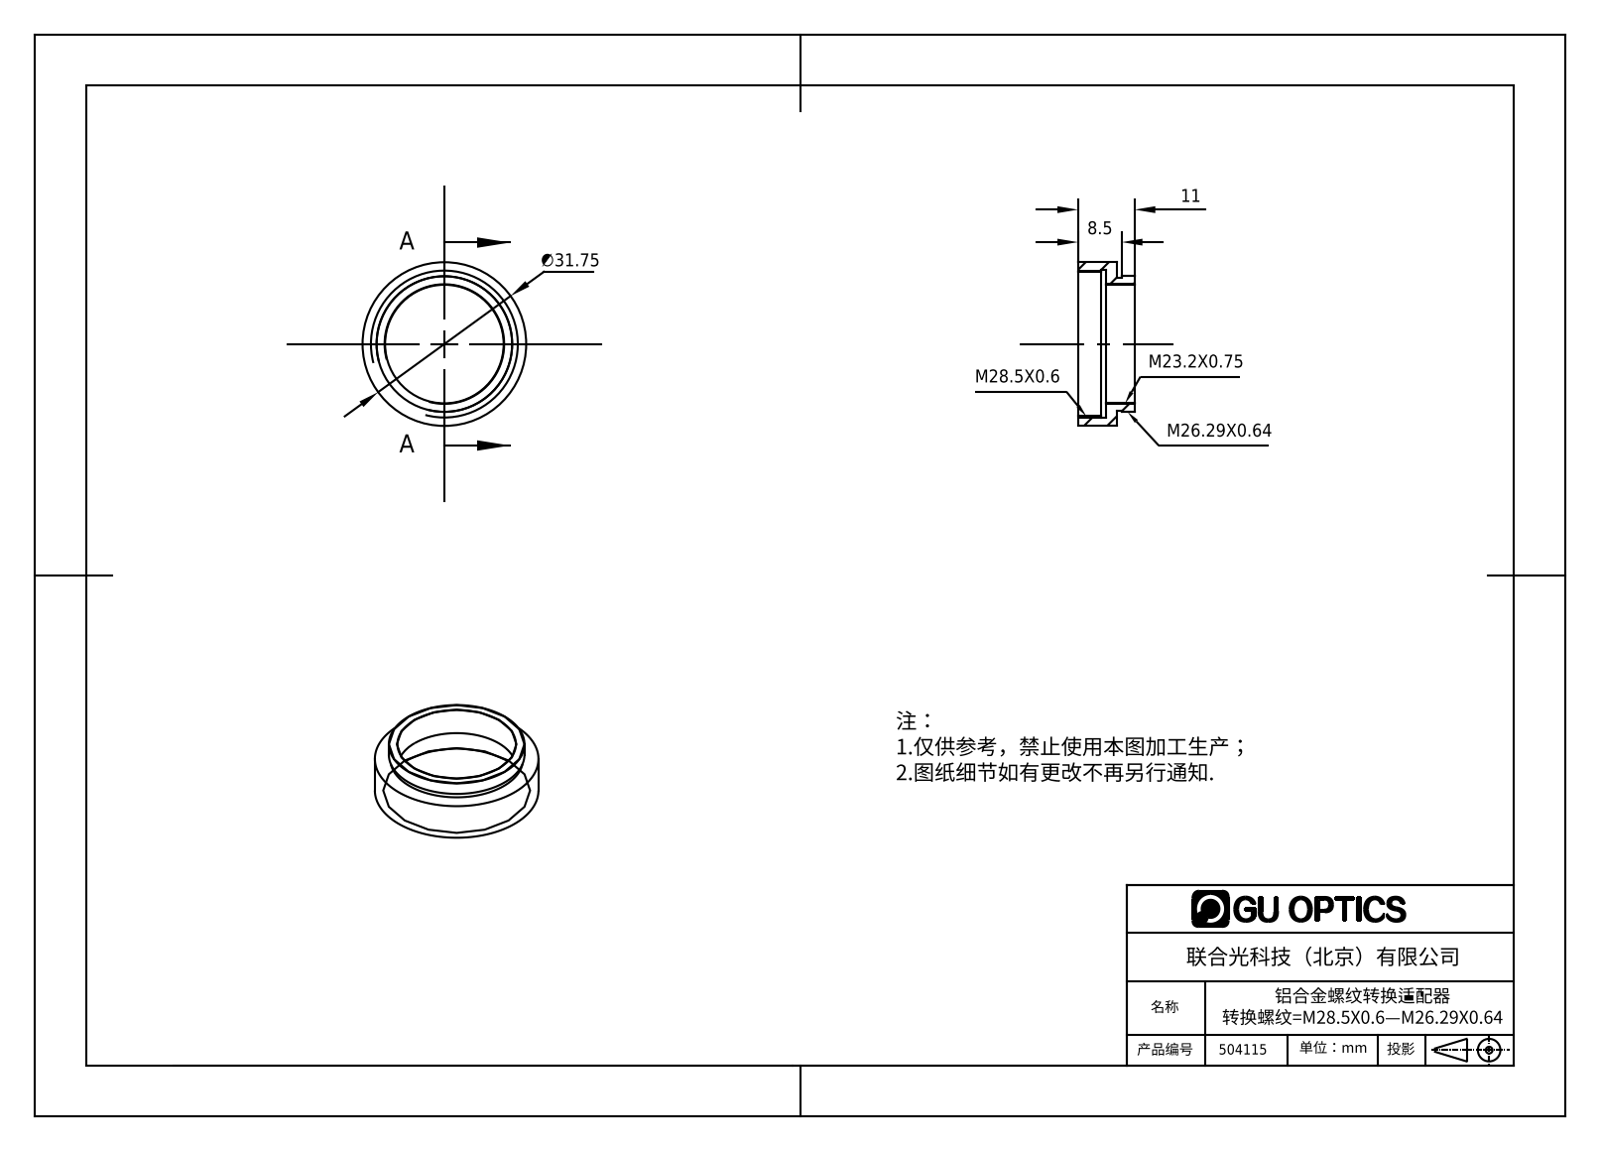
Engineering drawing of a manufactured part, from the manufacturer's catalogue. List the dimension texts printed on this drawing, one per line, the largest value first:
∅31.75
11
8.5
